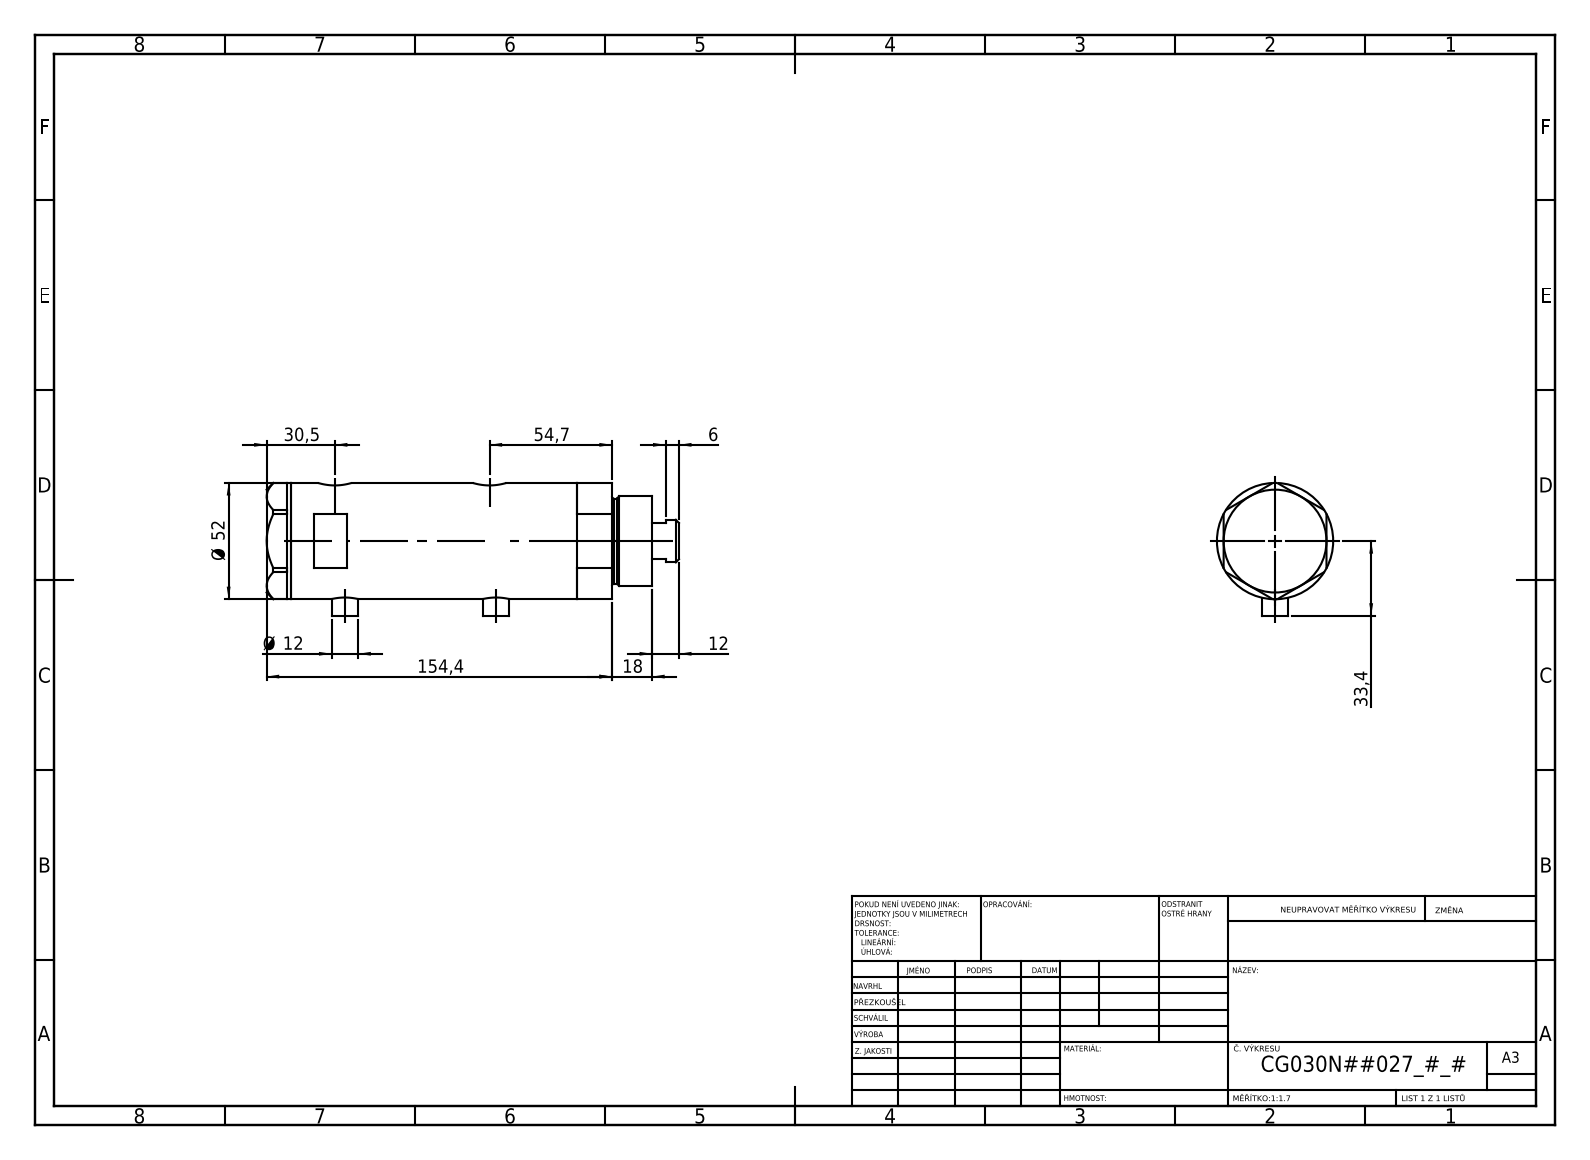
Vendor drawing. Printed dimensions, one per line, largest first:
154,4
54,7
Ø 52
33,4
30,5
18
12
Ø 12
6
